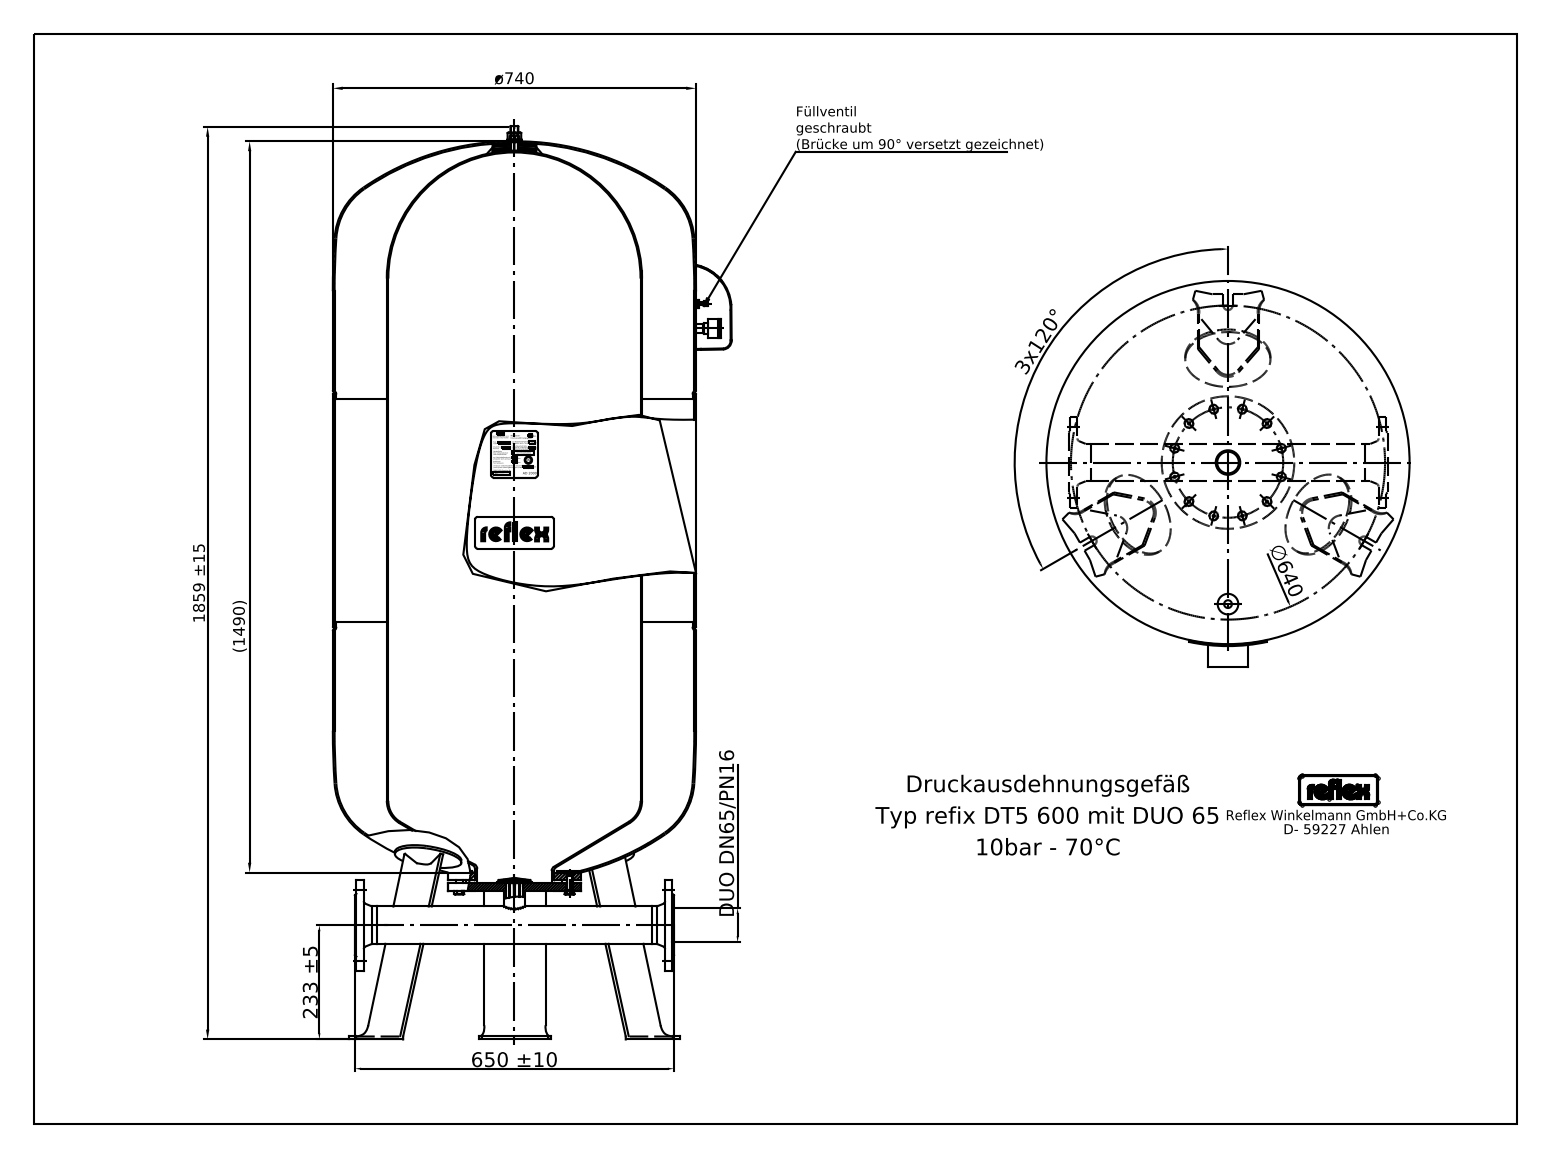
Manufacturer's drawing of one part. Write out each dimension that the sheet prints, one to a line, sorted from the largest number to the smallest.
1859 ±15
(1490)
ø740
650 ±10
∅640
233 ±5
3x120°
DUO DN65/PN16
